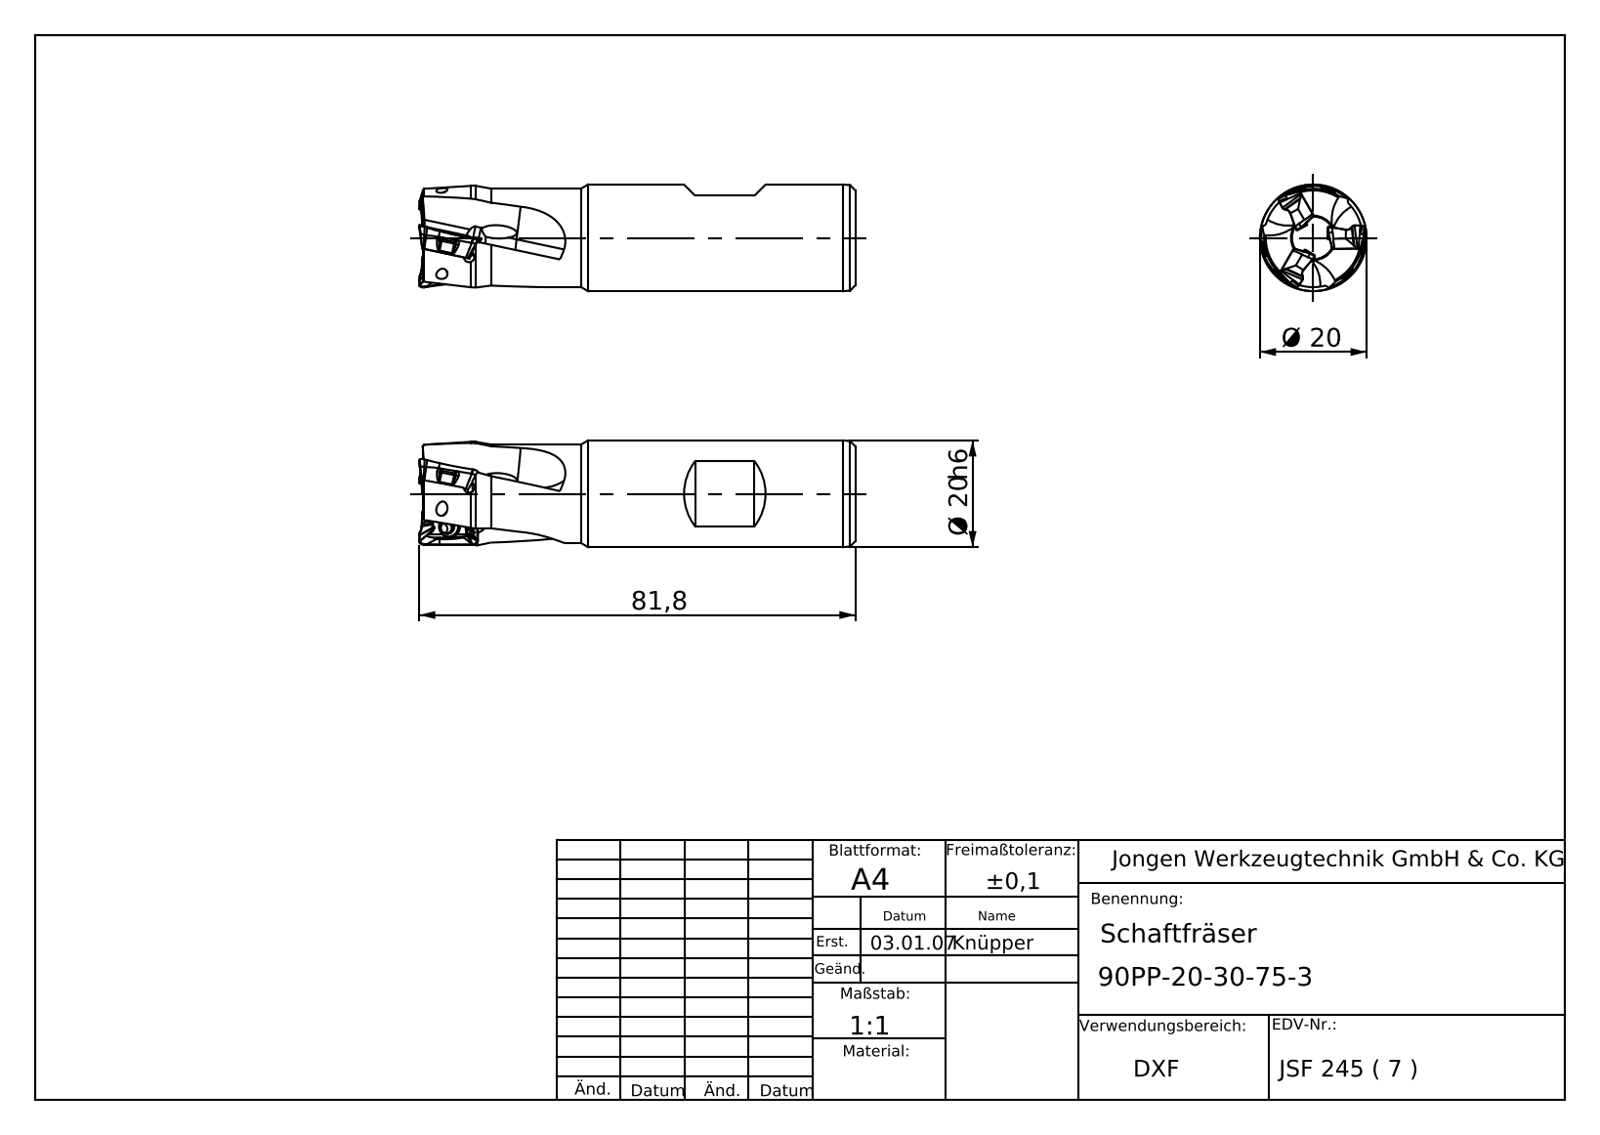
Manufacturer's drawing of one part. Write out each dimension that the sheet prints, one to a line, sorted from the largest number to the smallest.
81,8
Ø 20
Ø 20 h6
